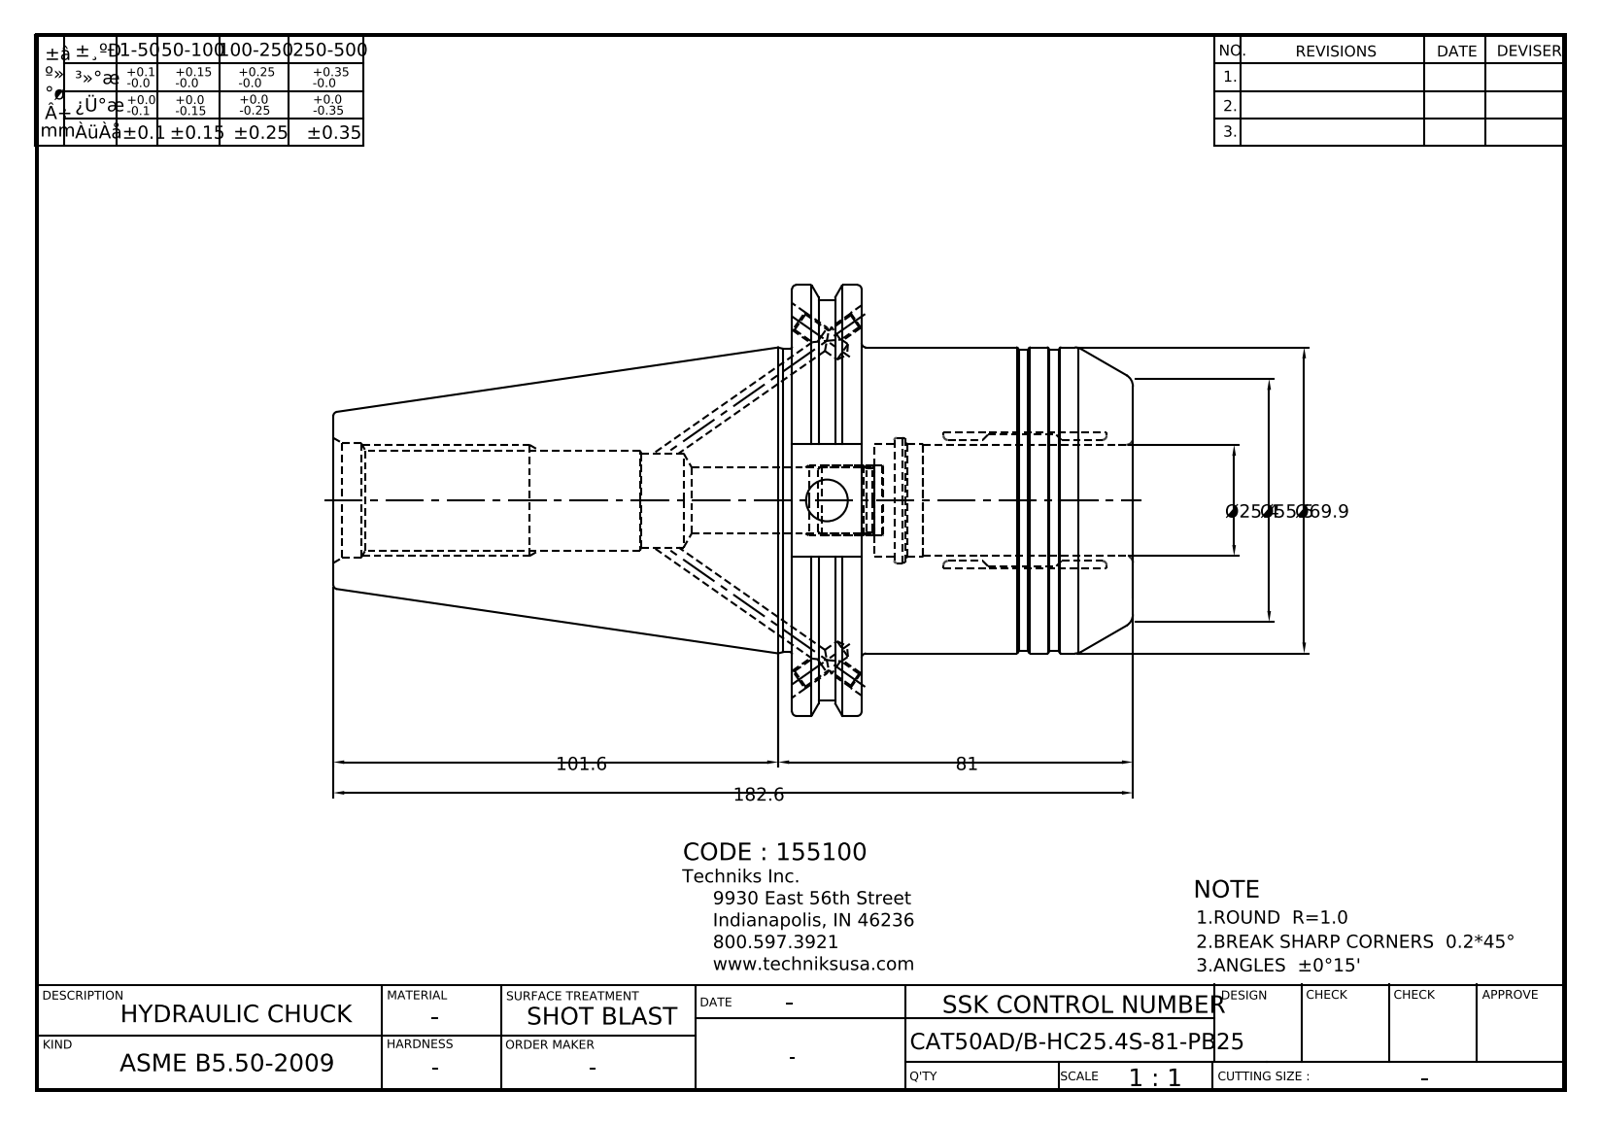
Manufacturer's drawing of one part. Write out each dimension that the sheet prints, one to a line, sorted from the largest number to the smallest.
182.6
101.6
81
Ø69.9
Ø55.5
Ø25.4
